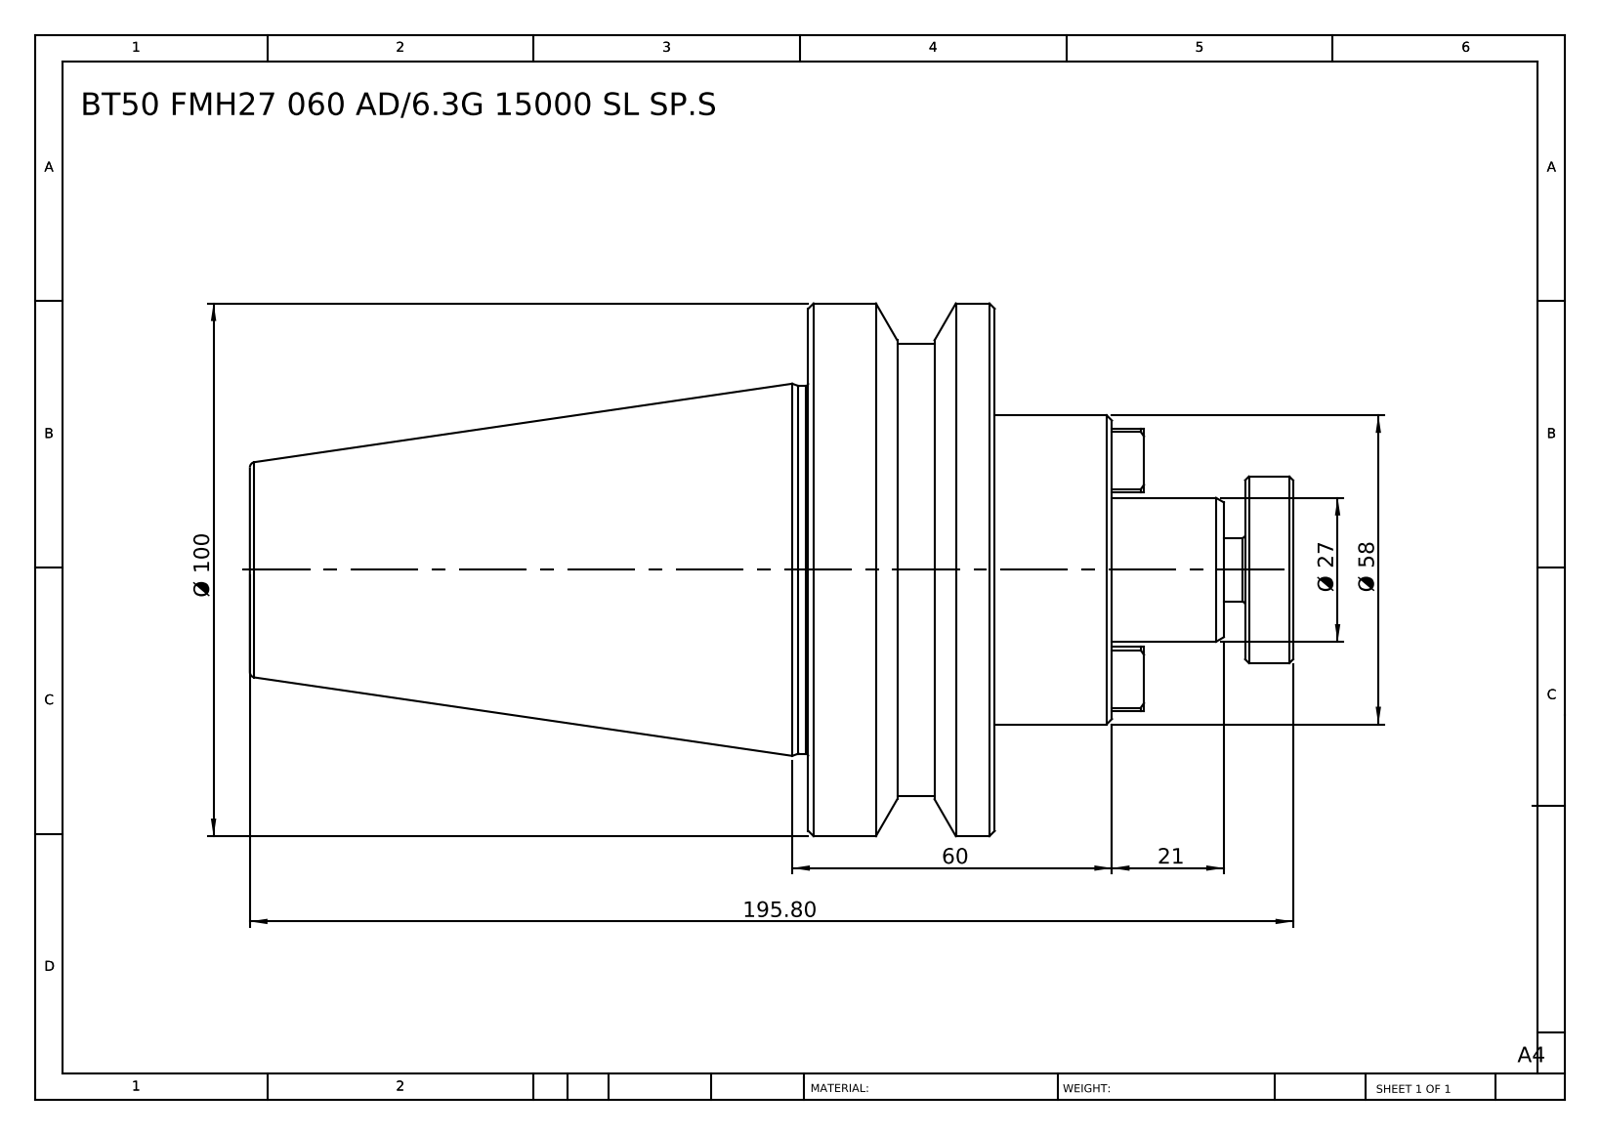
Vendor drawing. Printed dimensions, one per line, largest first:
195.80
Ø 100
60
Ø 58
Ø 27
21
